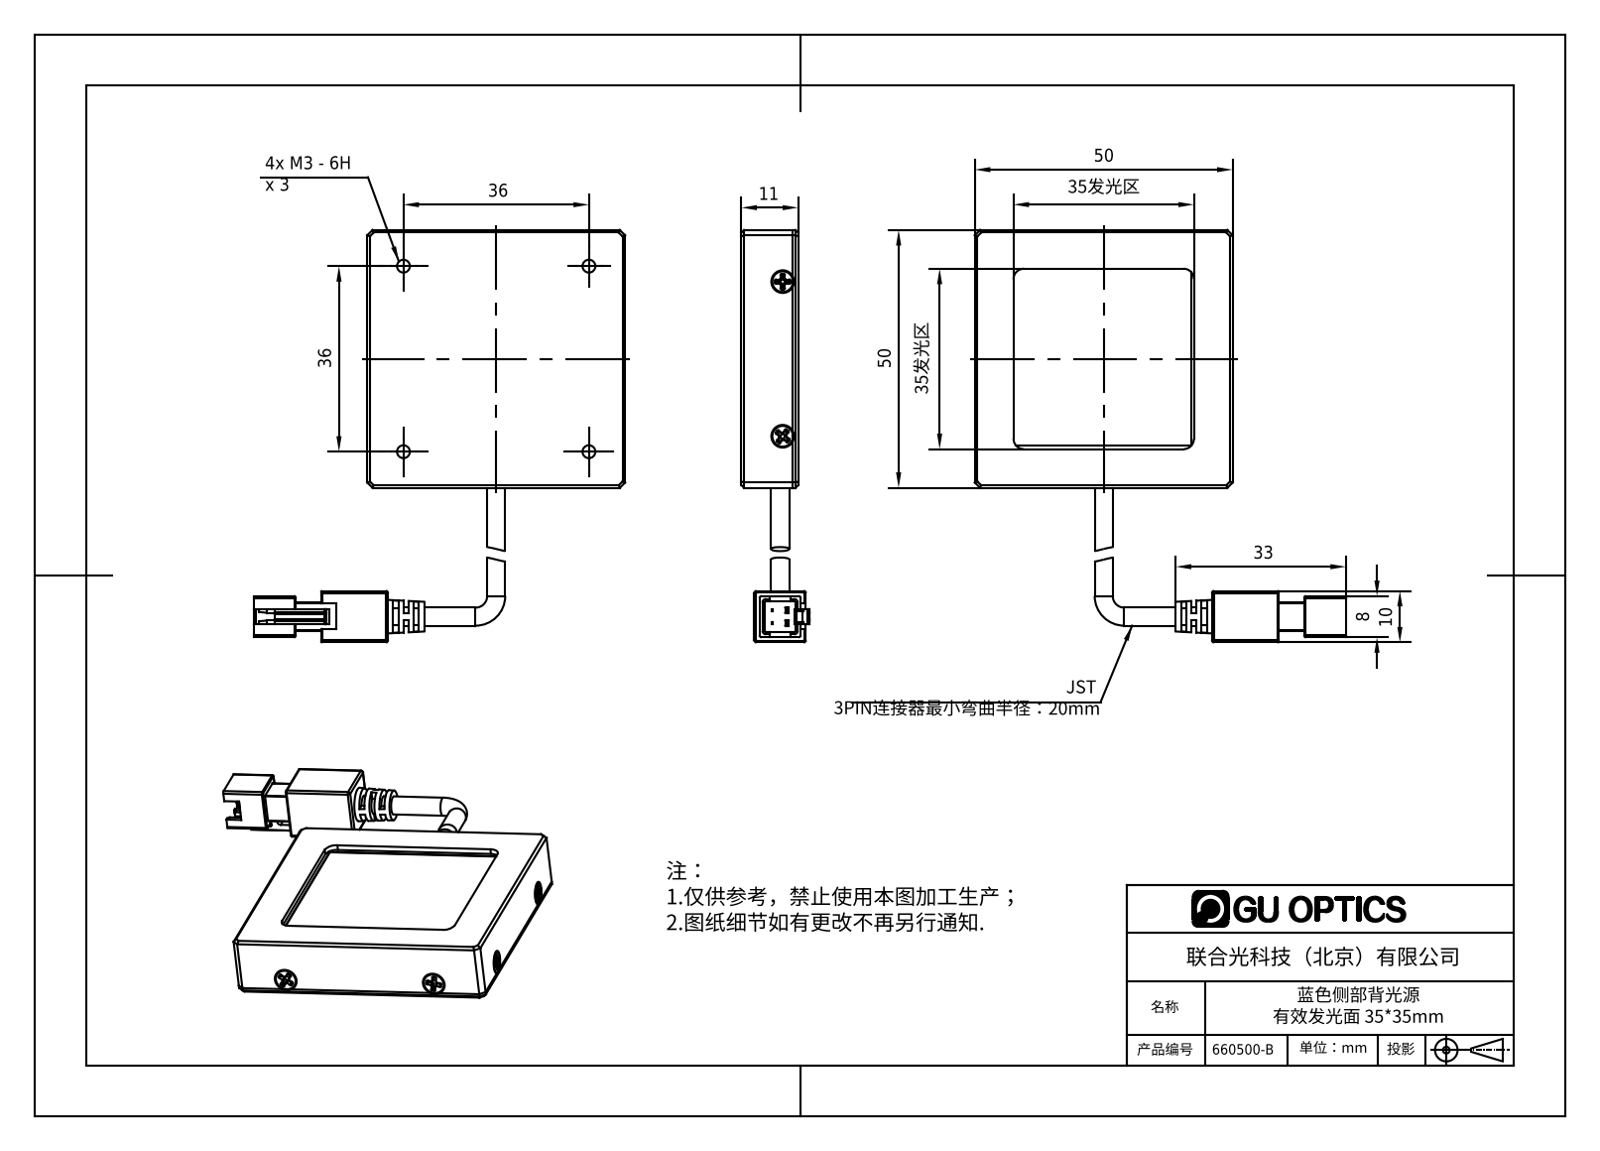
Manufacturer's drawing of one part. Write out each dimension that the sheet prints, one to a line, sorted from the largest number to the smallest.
50
50
36
36
35发光区
35发光区
33
11
10
8
